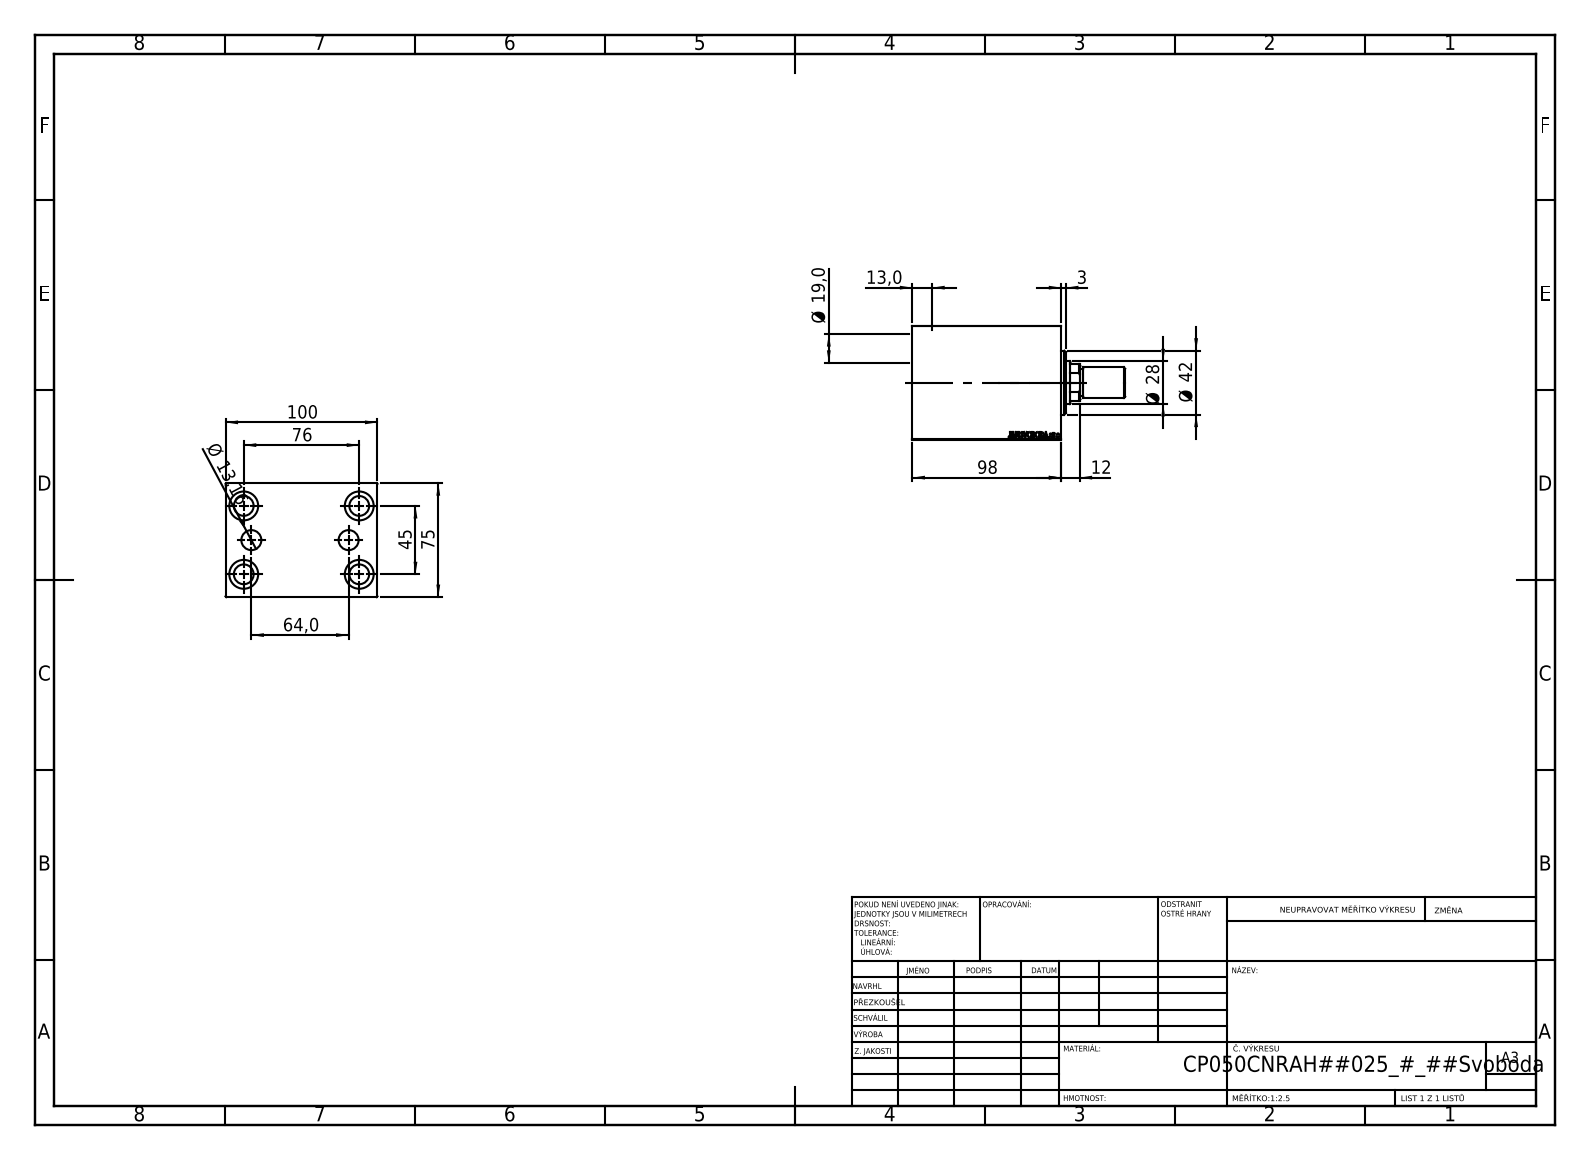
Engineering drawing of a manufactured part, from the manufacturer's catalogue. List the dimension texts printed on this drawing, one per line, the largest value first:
100
98
76
75
64,0
45
Ø 42
Ø 28
Ø 19,0
Ø 13,16
13,0
12
3
